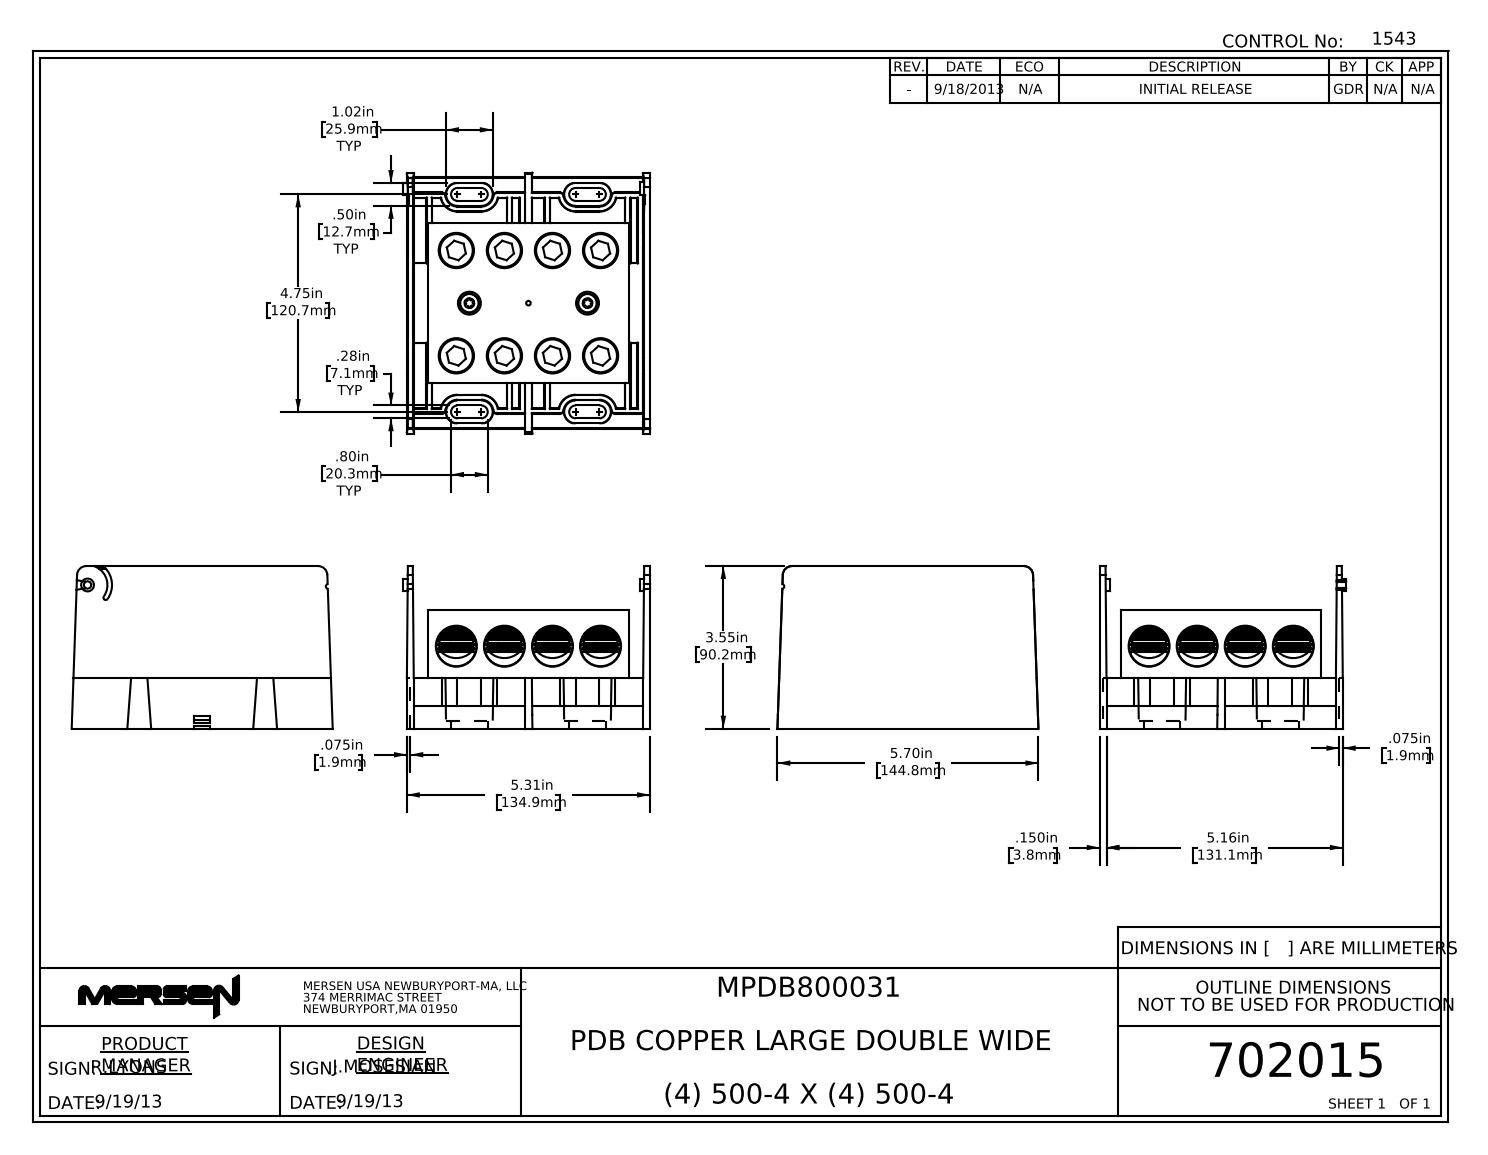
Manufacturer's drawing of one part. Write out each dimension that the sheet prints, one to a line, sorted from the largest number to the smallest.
5.70in 144.8mm
5.31in 134.9mm
5.16in 131.1mm
4.75in 120.7mm
3.55in 90.2mm
1.02in 25.9mm TYP
.80in 20.3mm TYP
.50in 12.7mm TYP
.28in 7.1mm TYP
.150in 3.8mm
.075in 1.9mm
.075in 1.9mm
